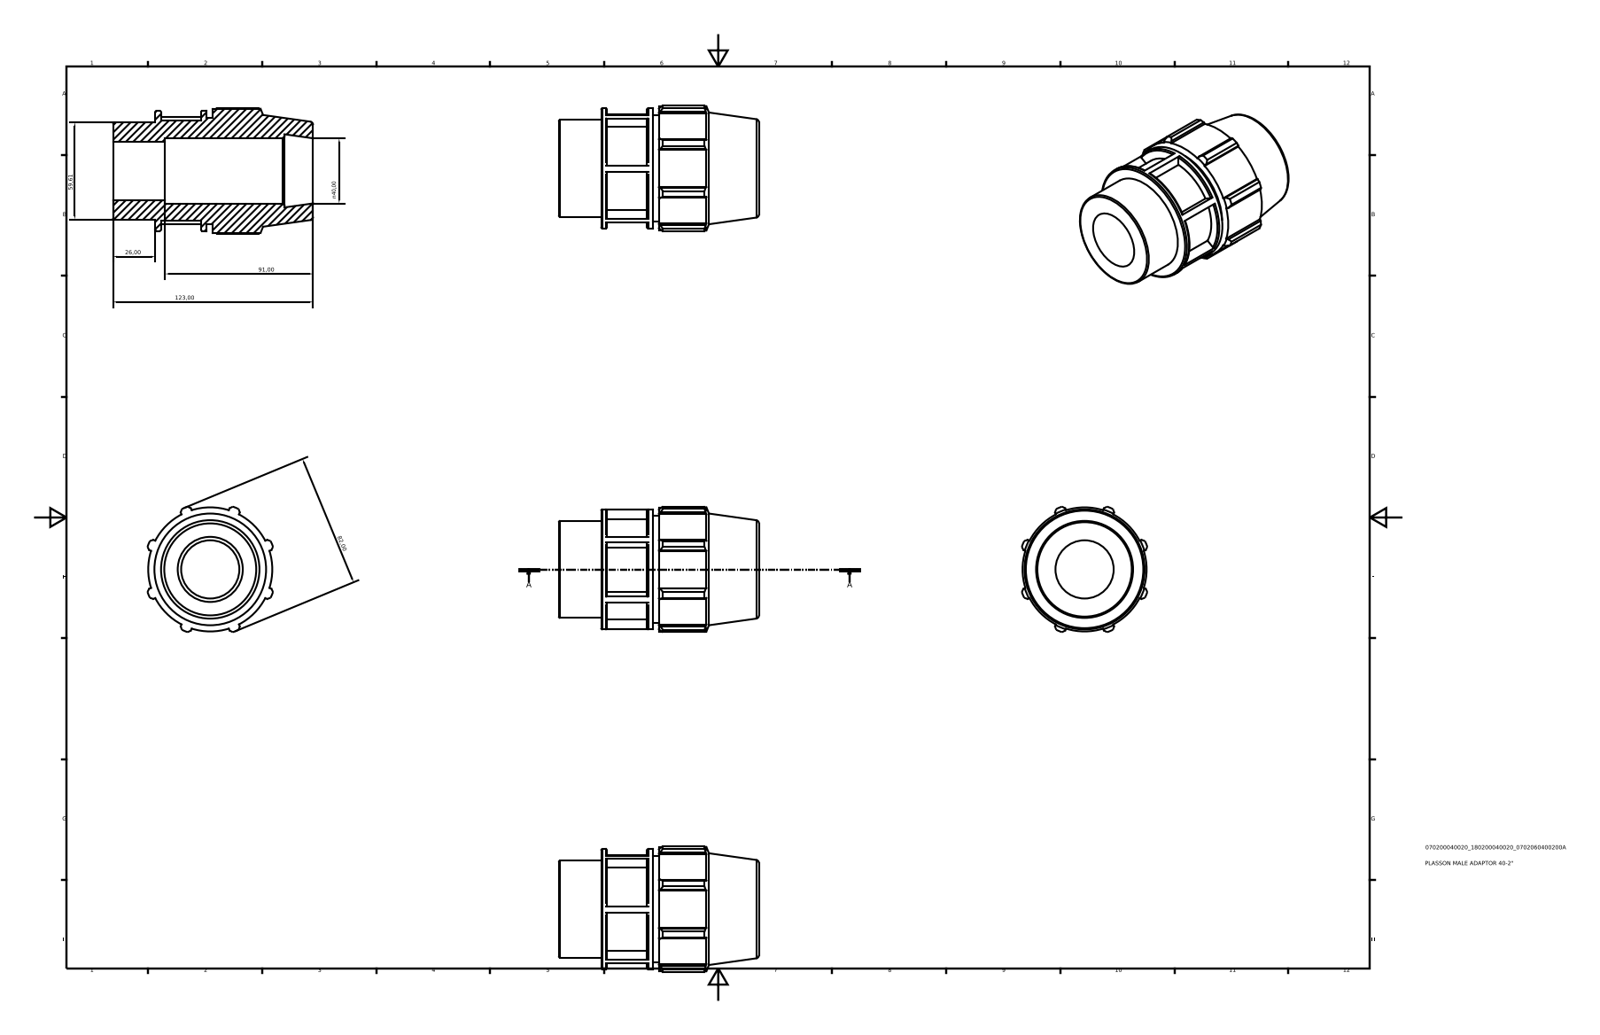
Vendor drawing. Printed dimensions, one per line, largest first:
123,00
91,00
82,00
59,61
n40,00
26,00
